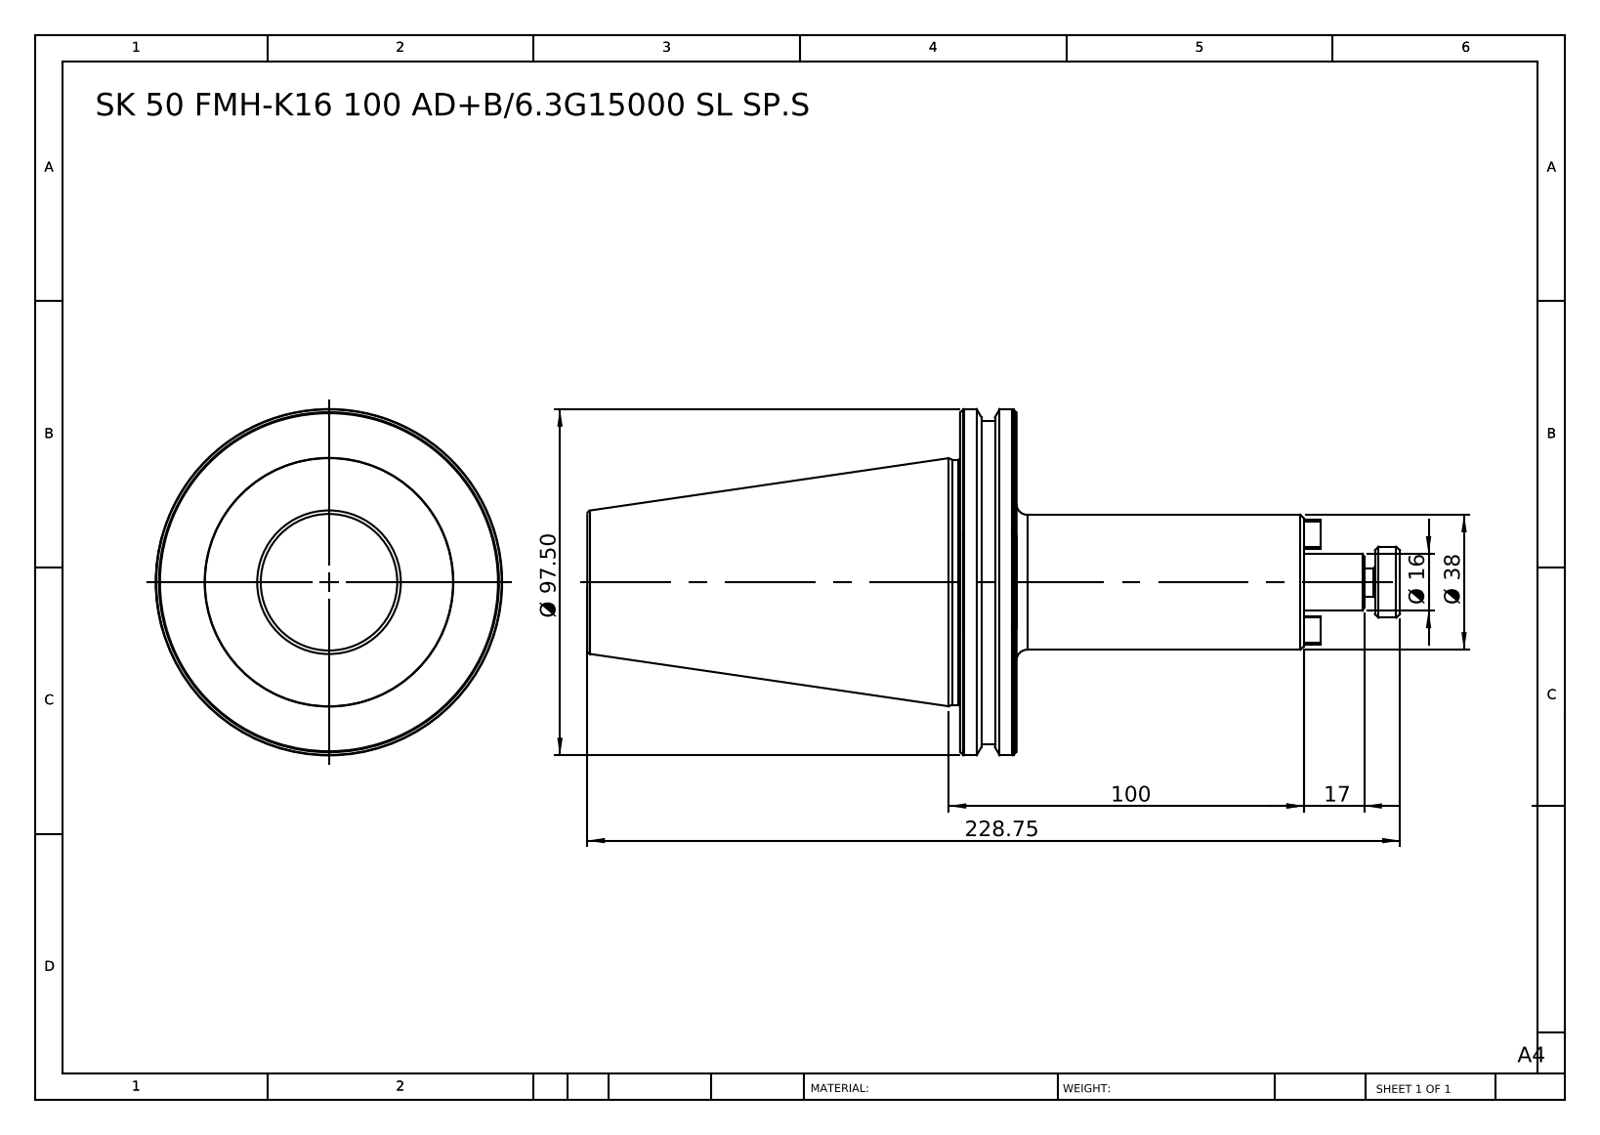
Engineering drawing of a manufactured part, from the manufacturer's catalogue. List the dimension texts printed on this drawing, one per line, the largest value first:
228.75
100
Ø 97.50
Ø 38
17
Ø 16
